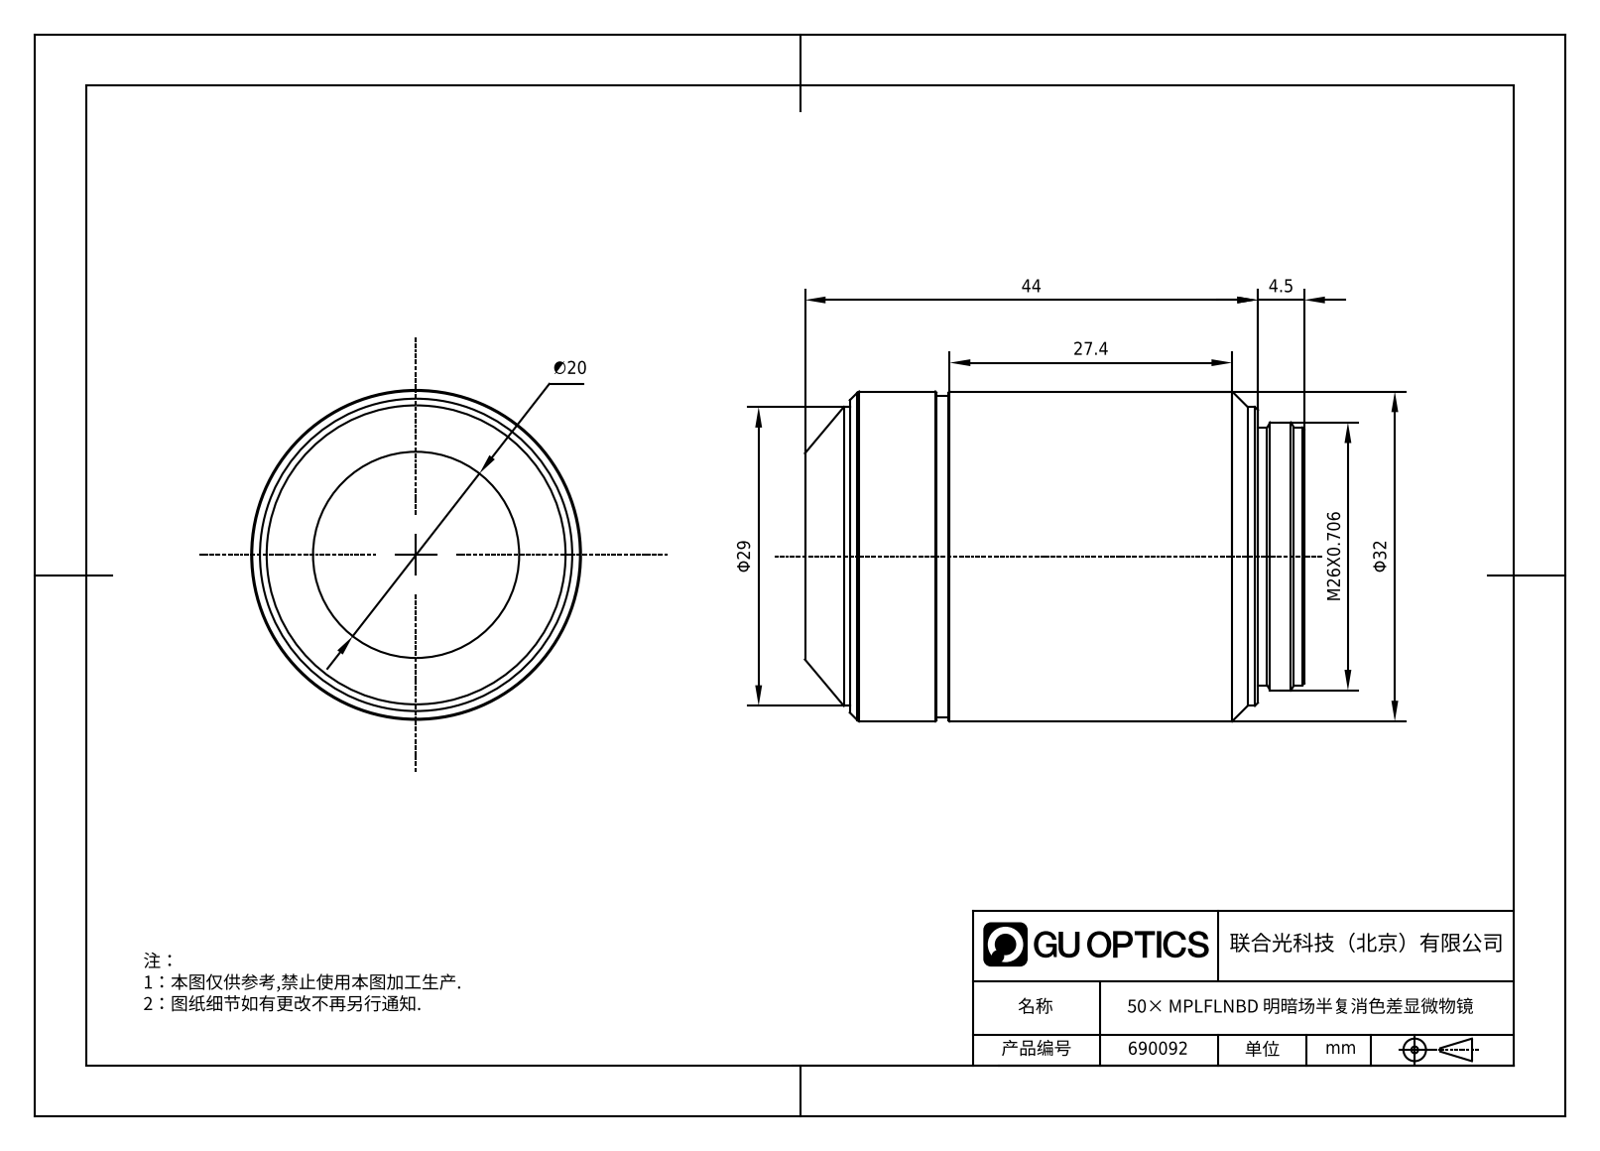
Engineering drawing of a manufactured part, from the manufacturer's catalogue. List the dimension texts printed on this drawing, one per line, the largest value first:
44
Φ32
Φ29
27.4
M26X0.706
∅20
4.5
